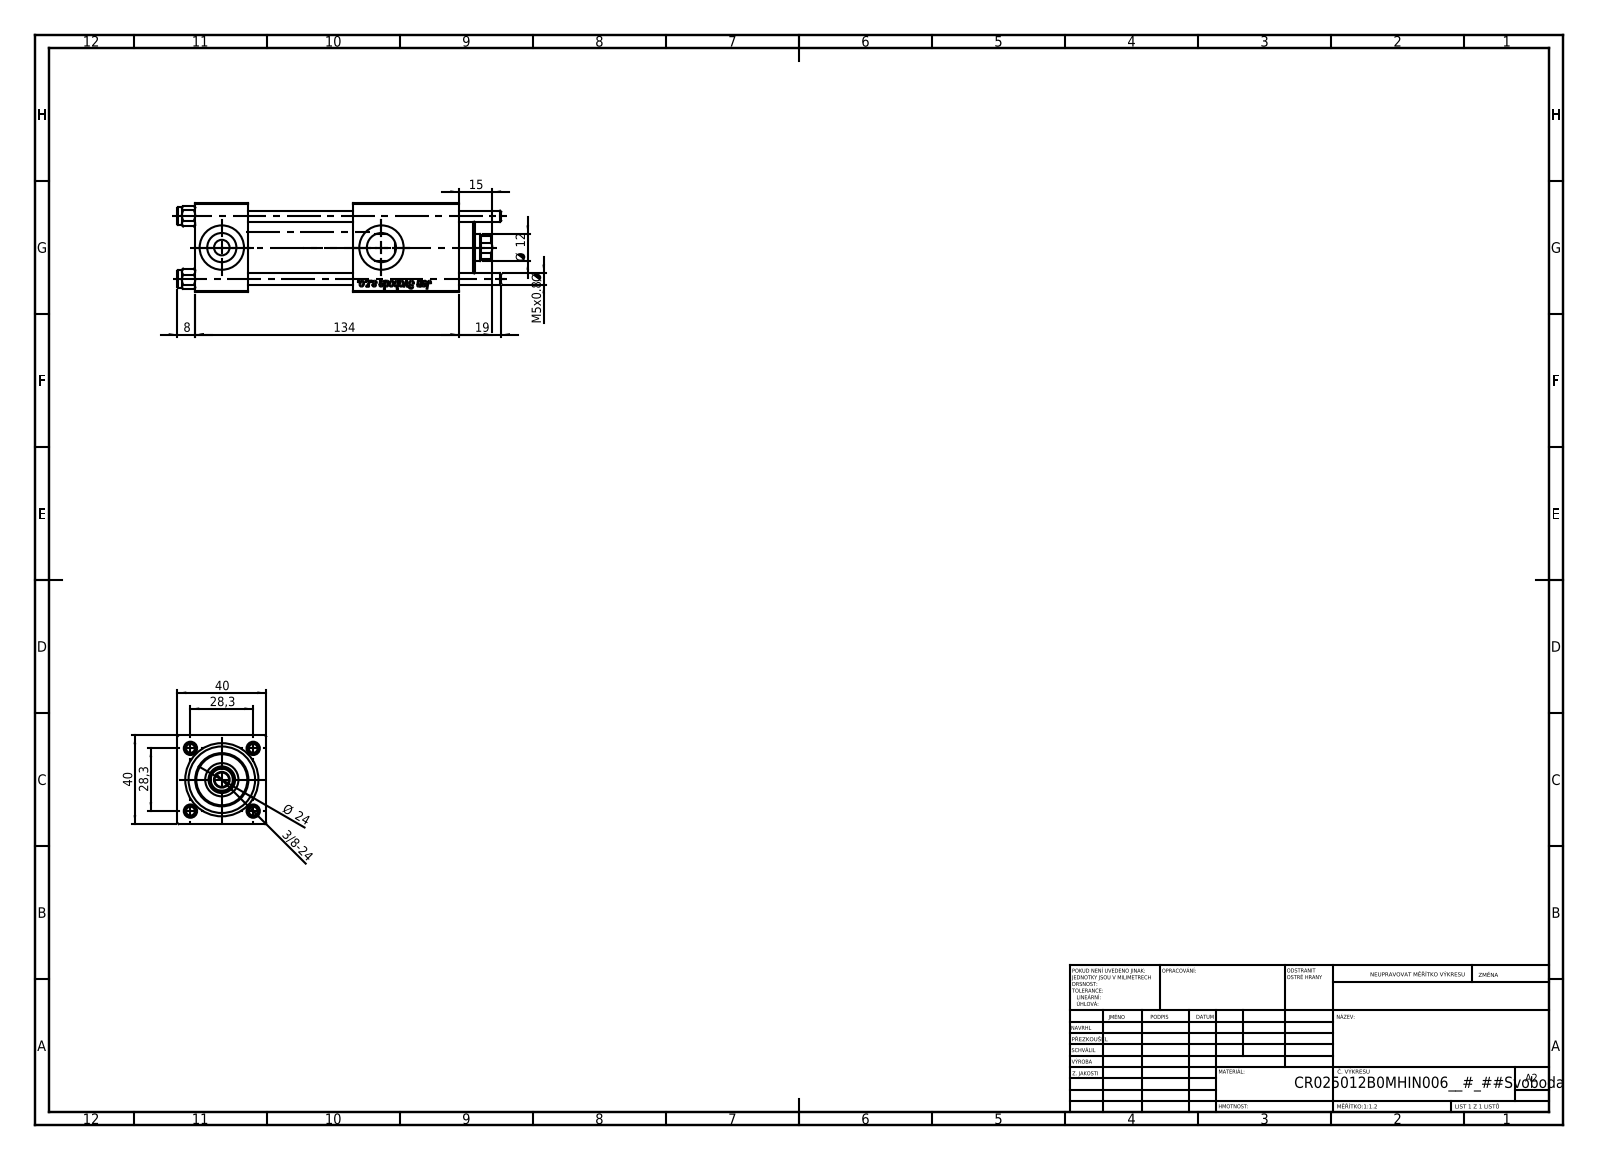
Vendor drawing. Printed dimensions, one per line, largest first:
134
40
40
28,3
28,3
Ø 24
19
15
Ø 12
8
M5x0.8 Ø
3/8-24
